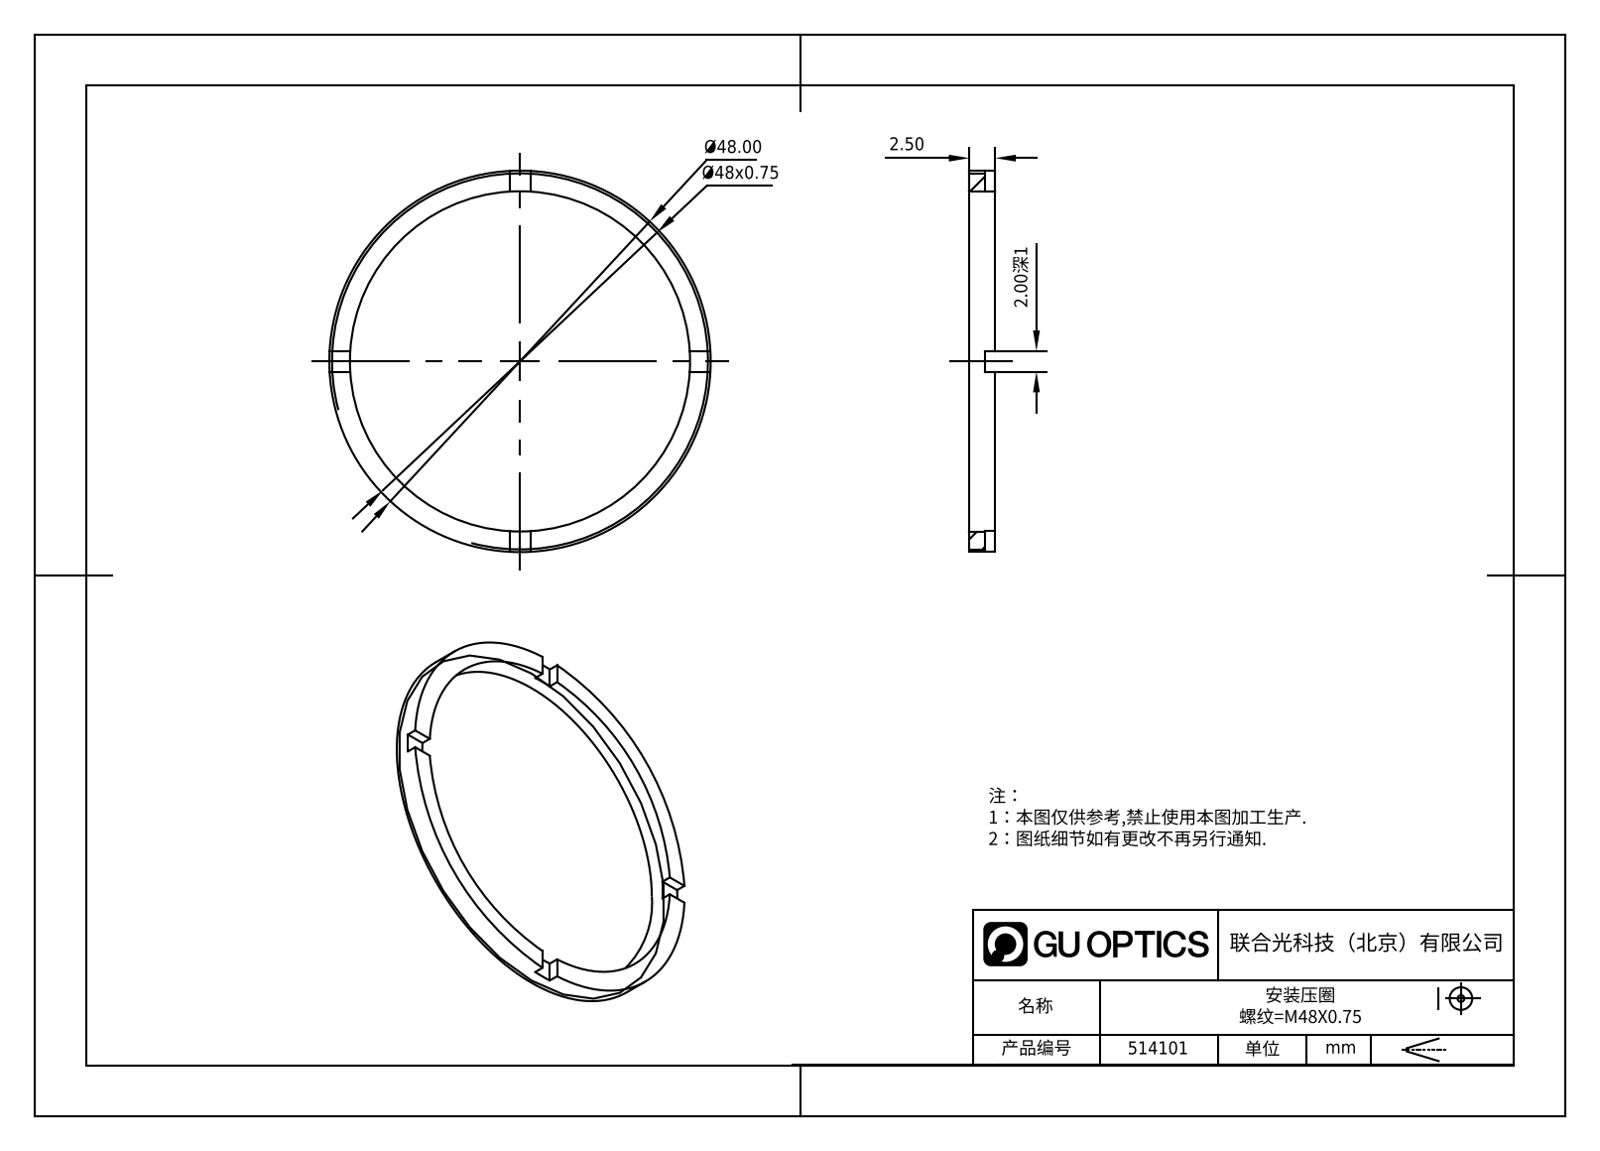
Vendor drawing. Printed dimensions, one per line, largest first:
Ø48.00
Ø48x0.75
2.50
2.00深1
